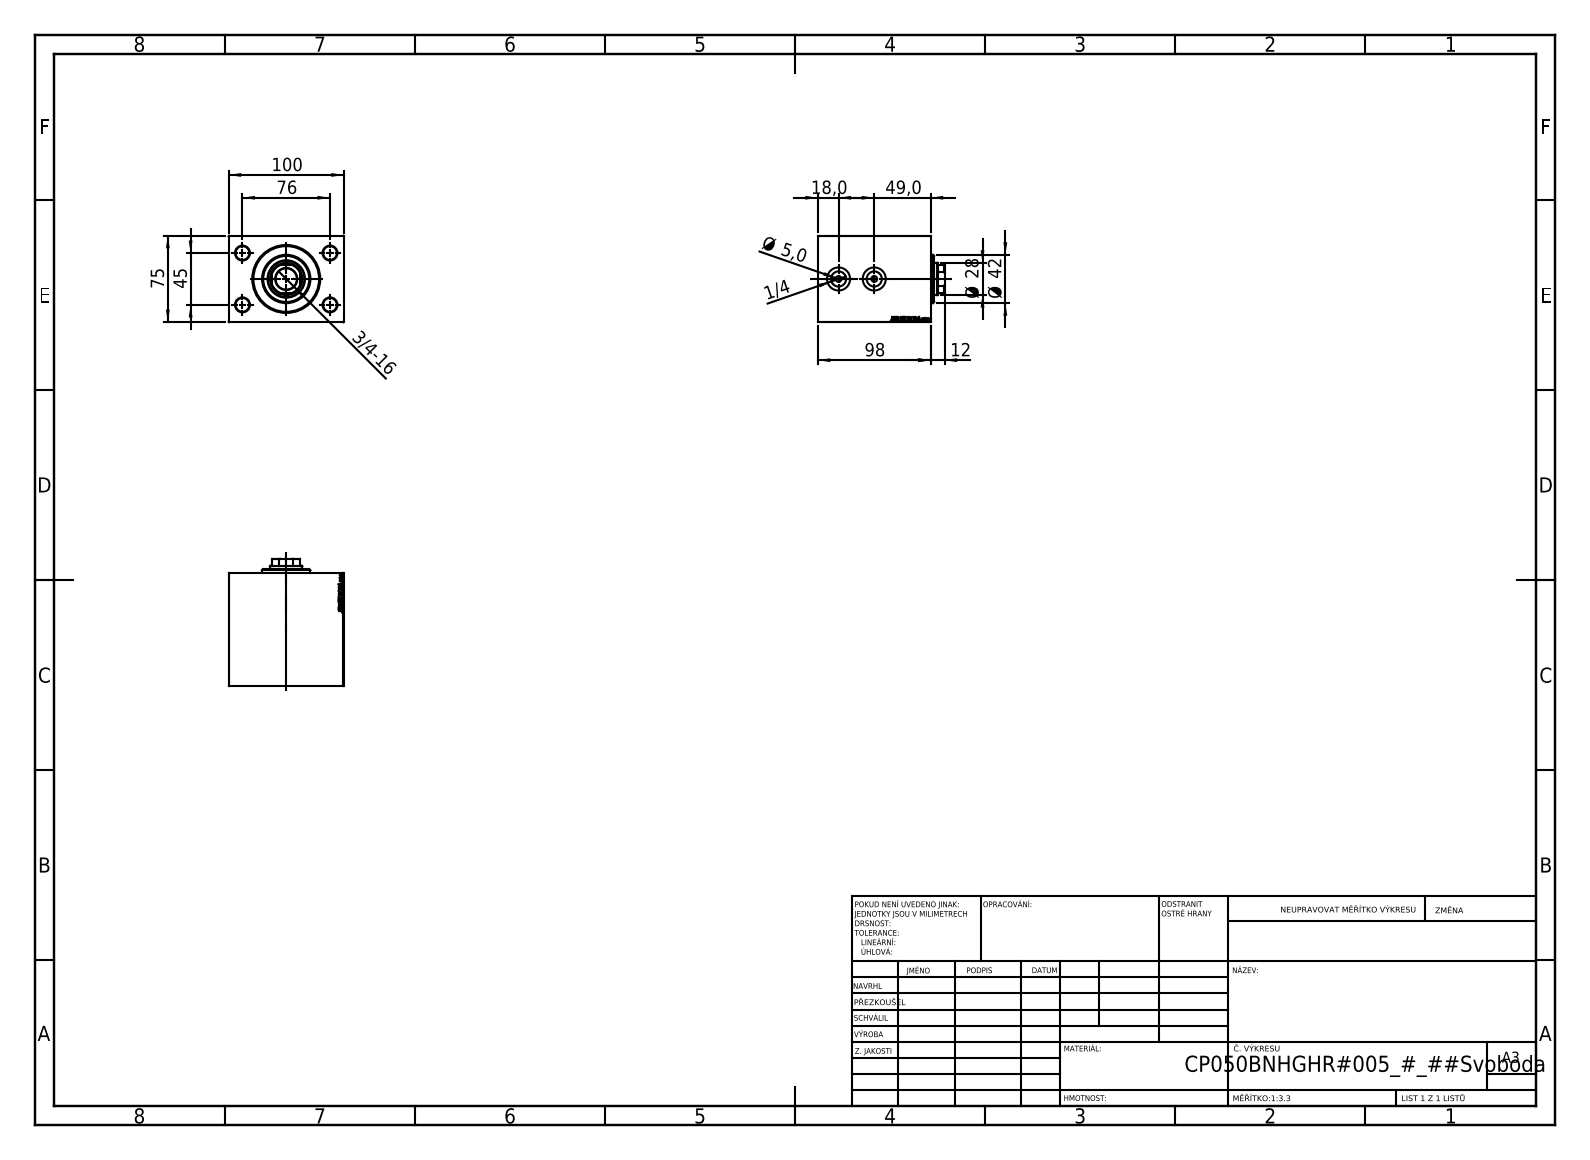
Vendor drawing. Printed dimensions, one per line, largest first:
100
98
76
75
49,0
45
Ø 42
Ø 28
18,0
12
Ø 5,0
3/4-16
1/4
